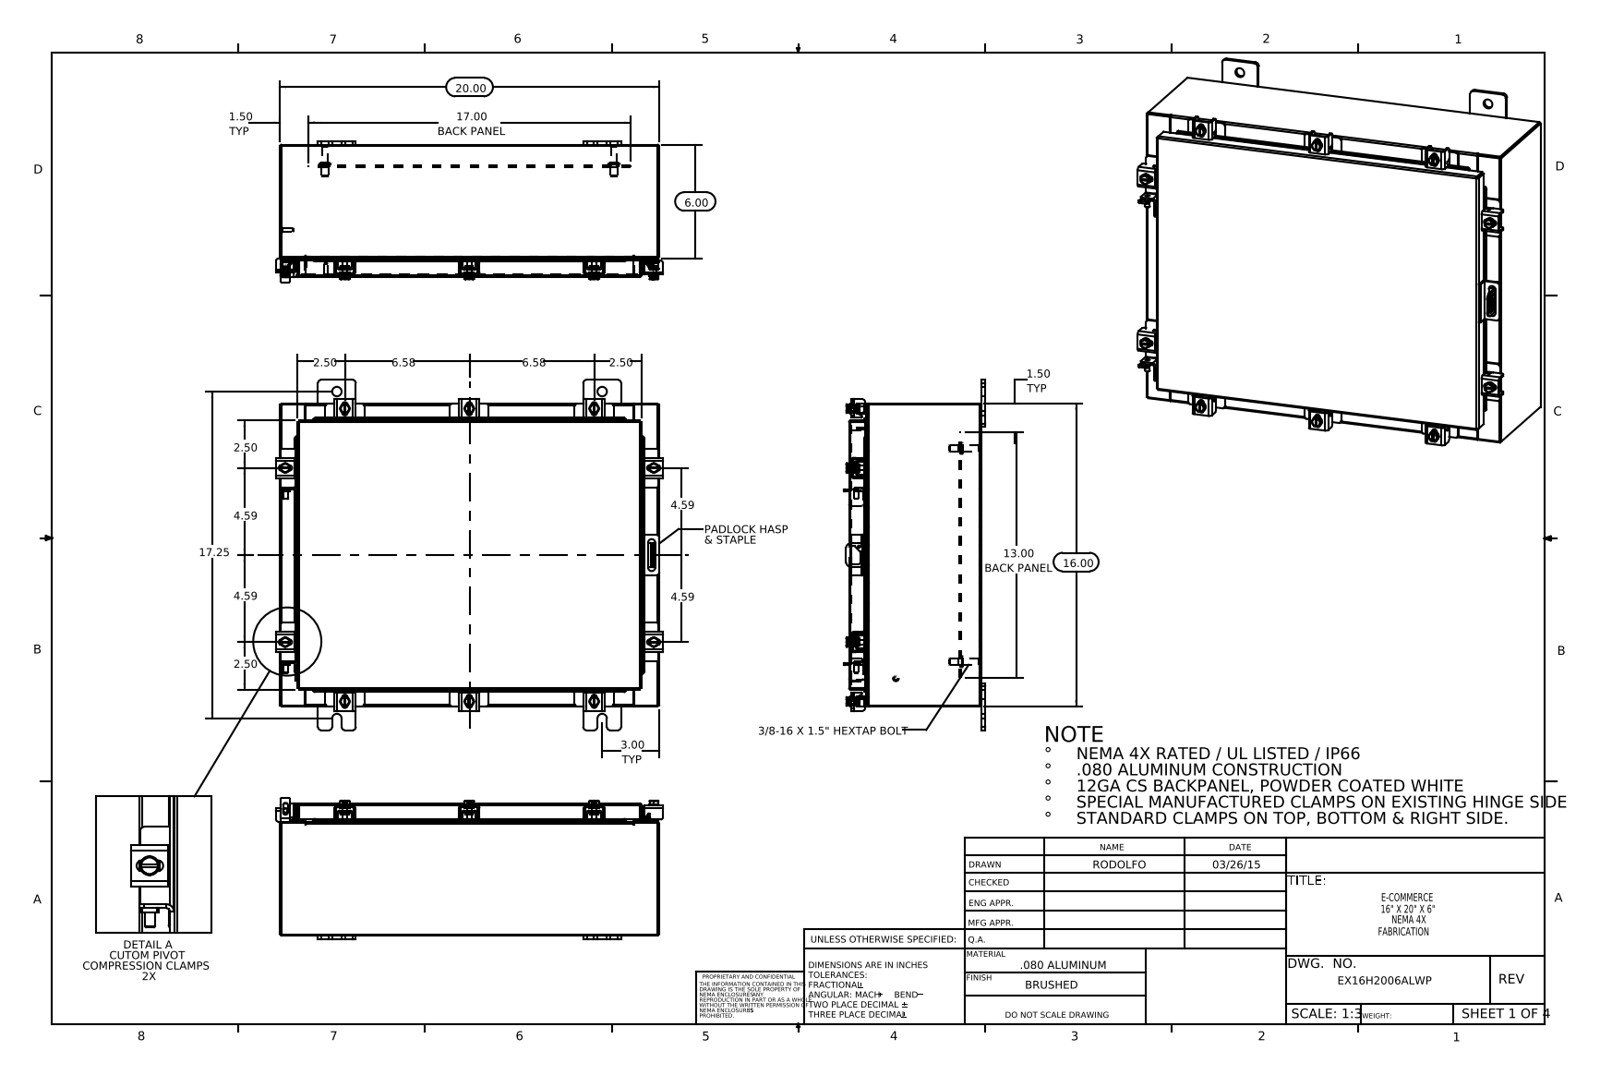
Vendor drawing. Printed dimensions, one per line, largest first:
20.00
17.25
17.00 BACK PANEL
16.00
13.00 BACK PANEL
6.58
6.58
6.00
4.59
4.59
4.59
4.59
3.00 TYP
2.50
2.50
2.50
2.50
1.50 TYP
1.50 TYP
